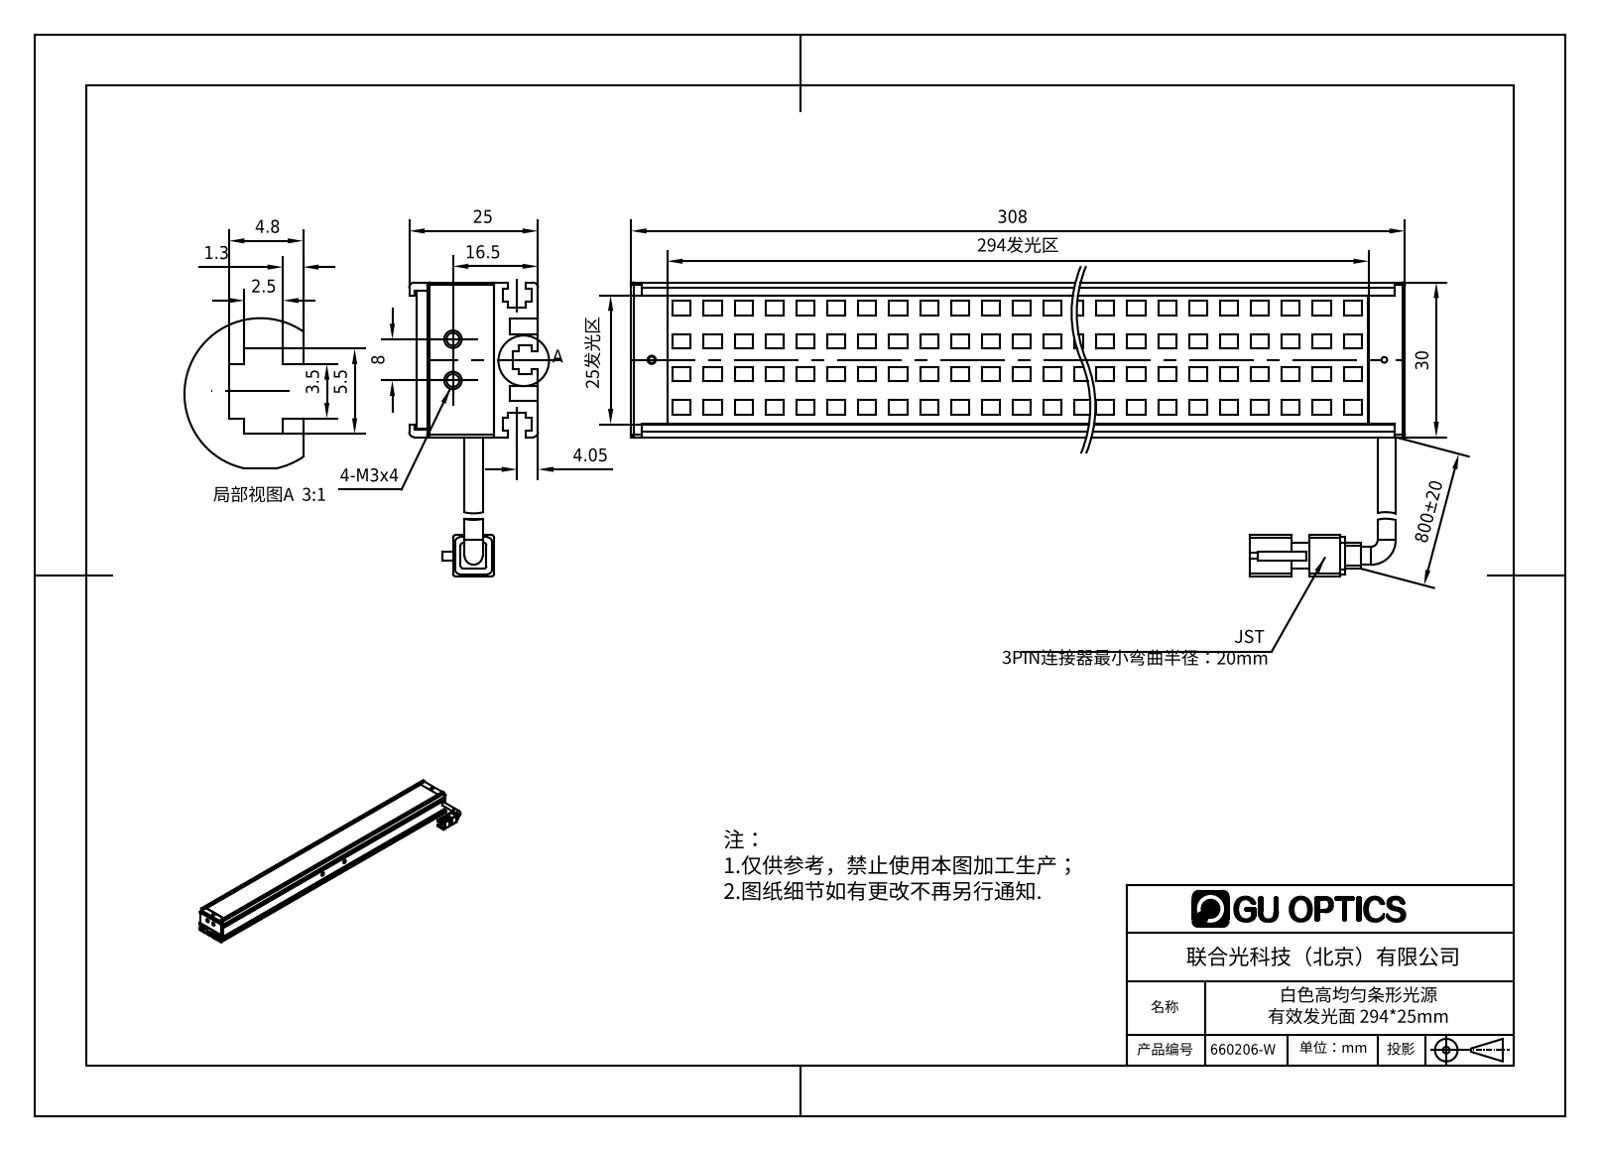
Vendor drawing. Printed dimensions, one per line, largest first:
800±20
308
294发光区
30
25发光区
25
16.5
8
5.5
4.8
4.05
3.5
2.5
1.3
